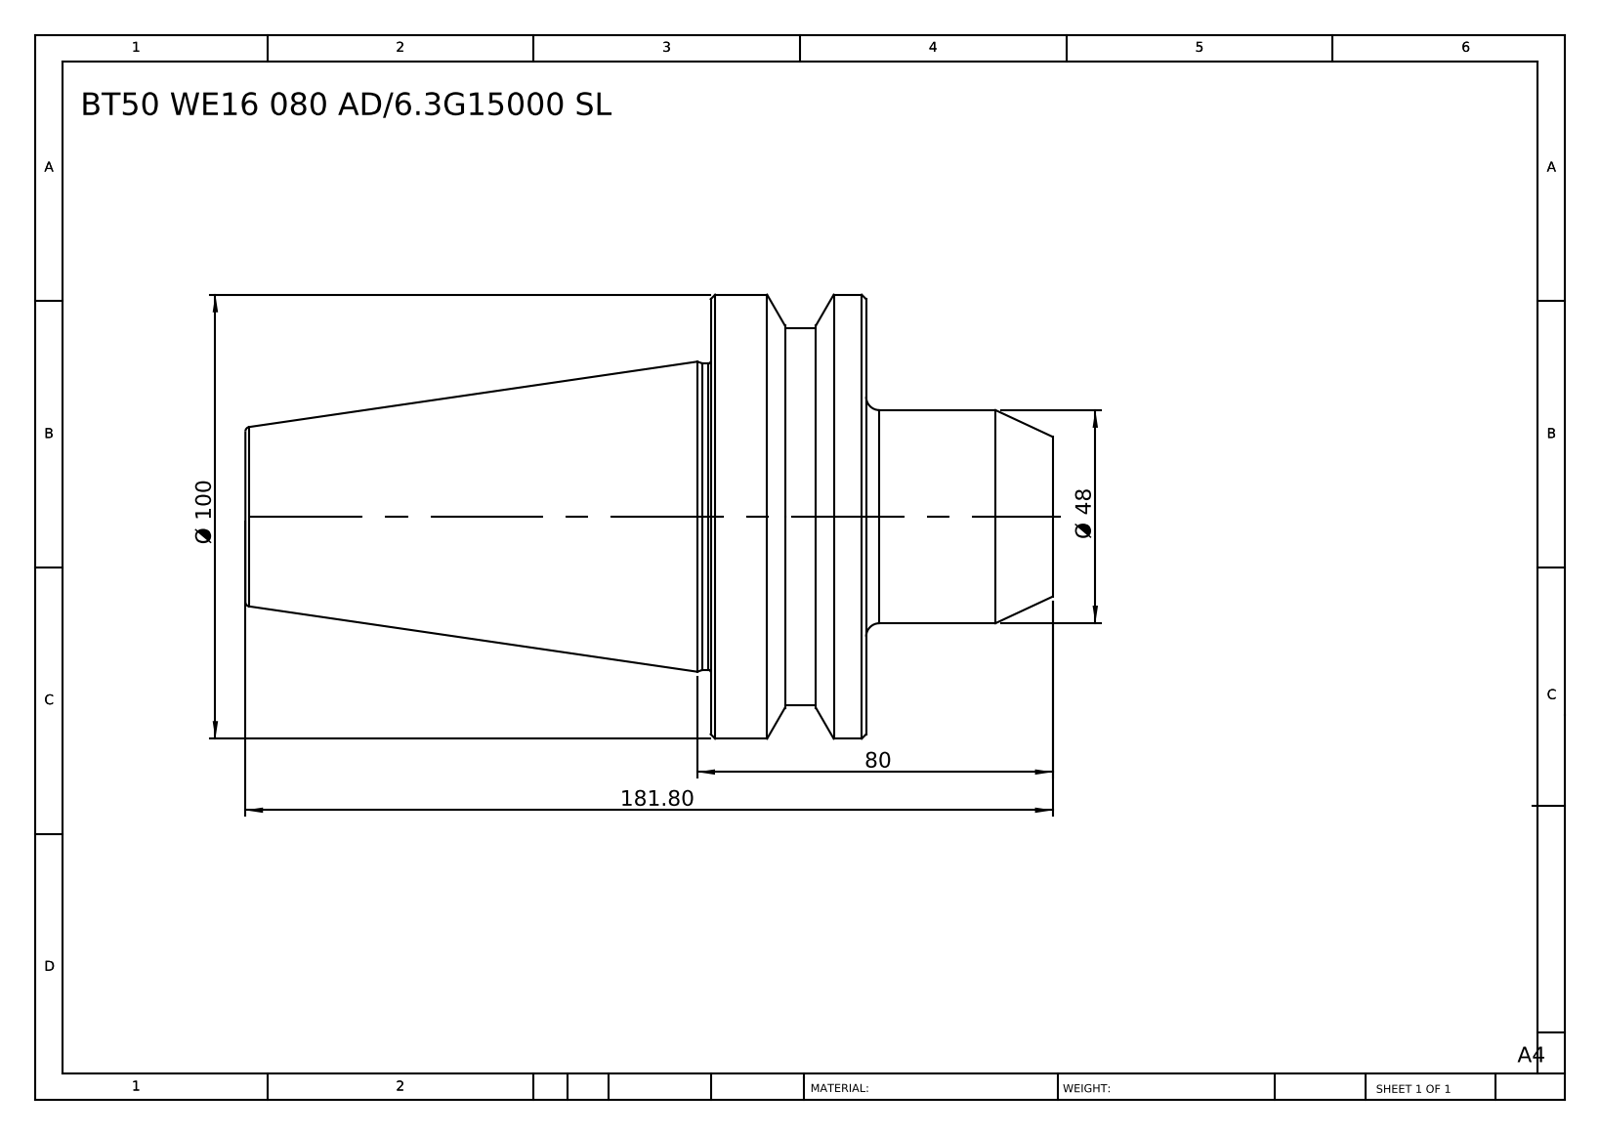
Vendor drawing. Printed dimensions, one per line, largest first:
181.80
Ø 100
80
Ø 48
